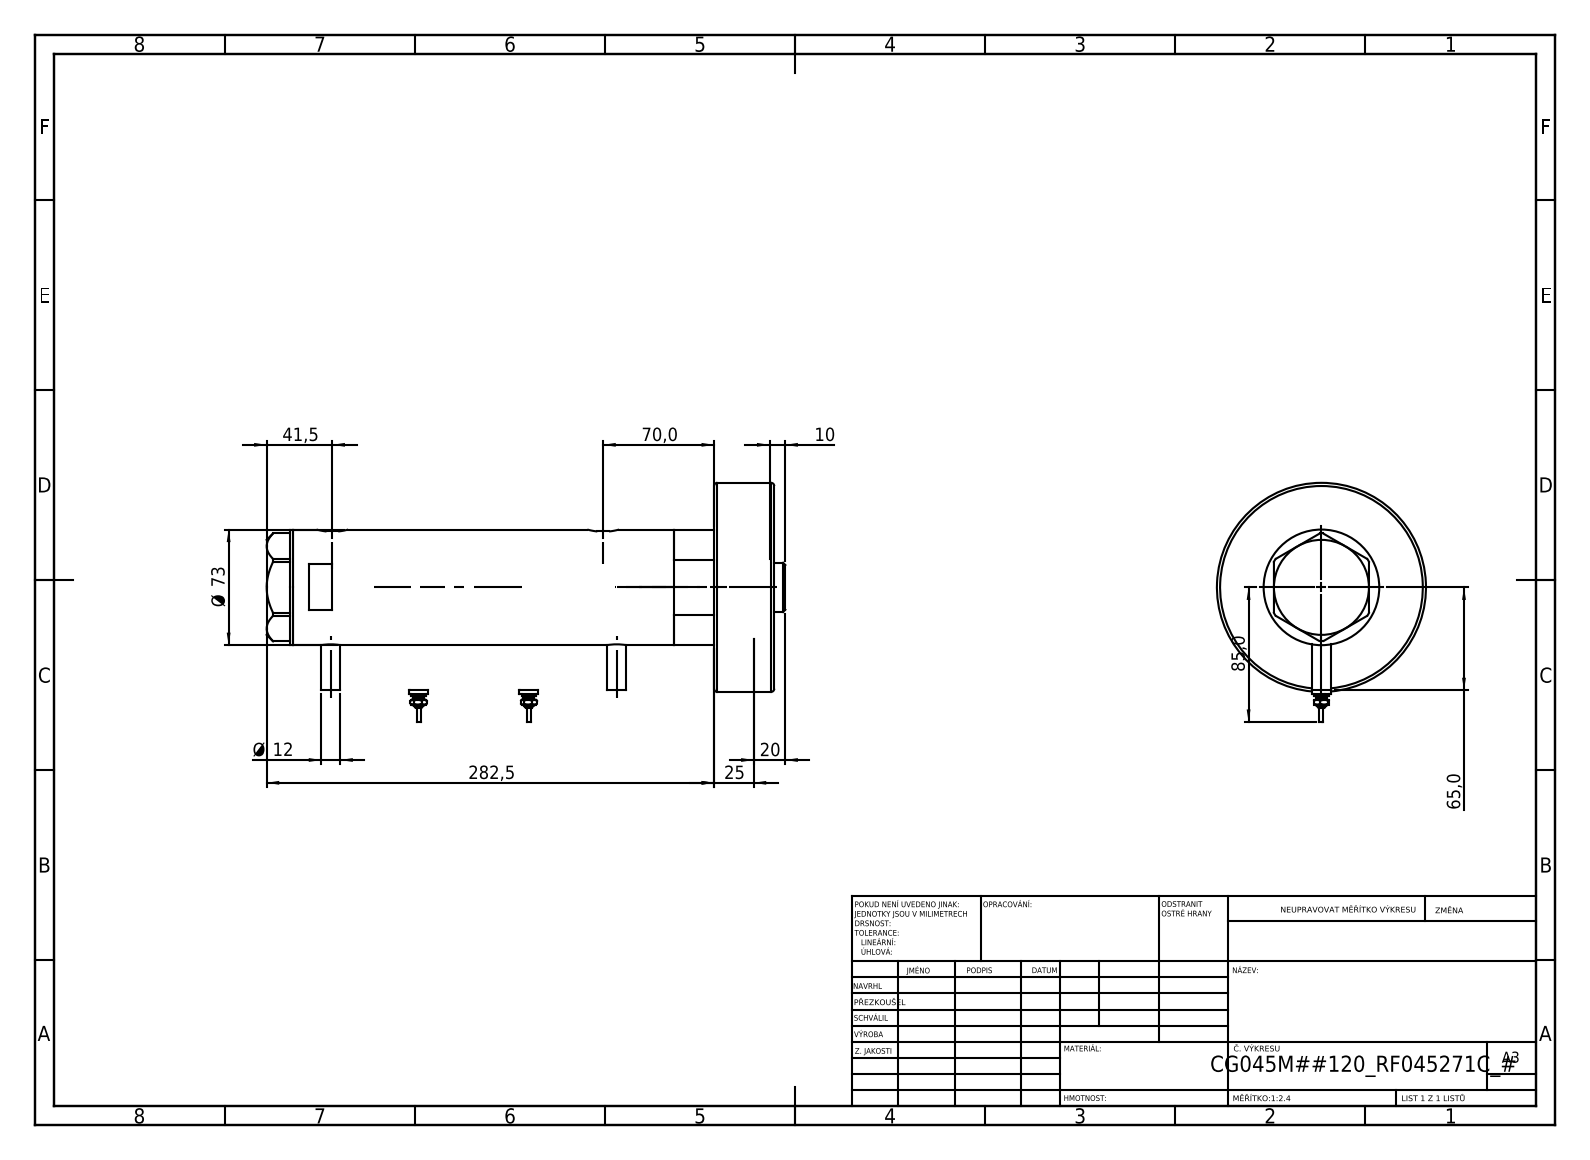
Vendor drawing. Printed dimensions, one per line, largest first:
282,5
85,0
Ø 73
70,0
65,0
41,5
25
20
Ø 12
10
